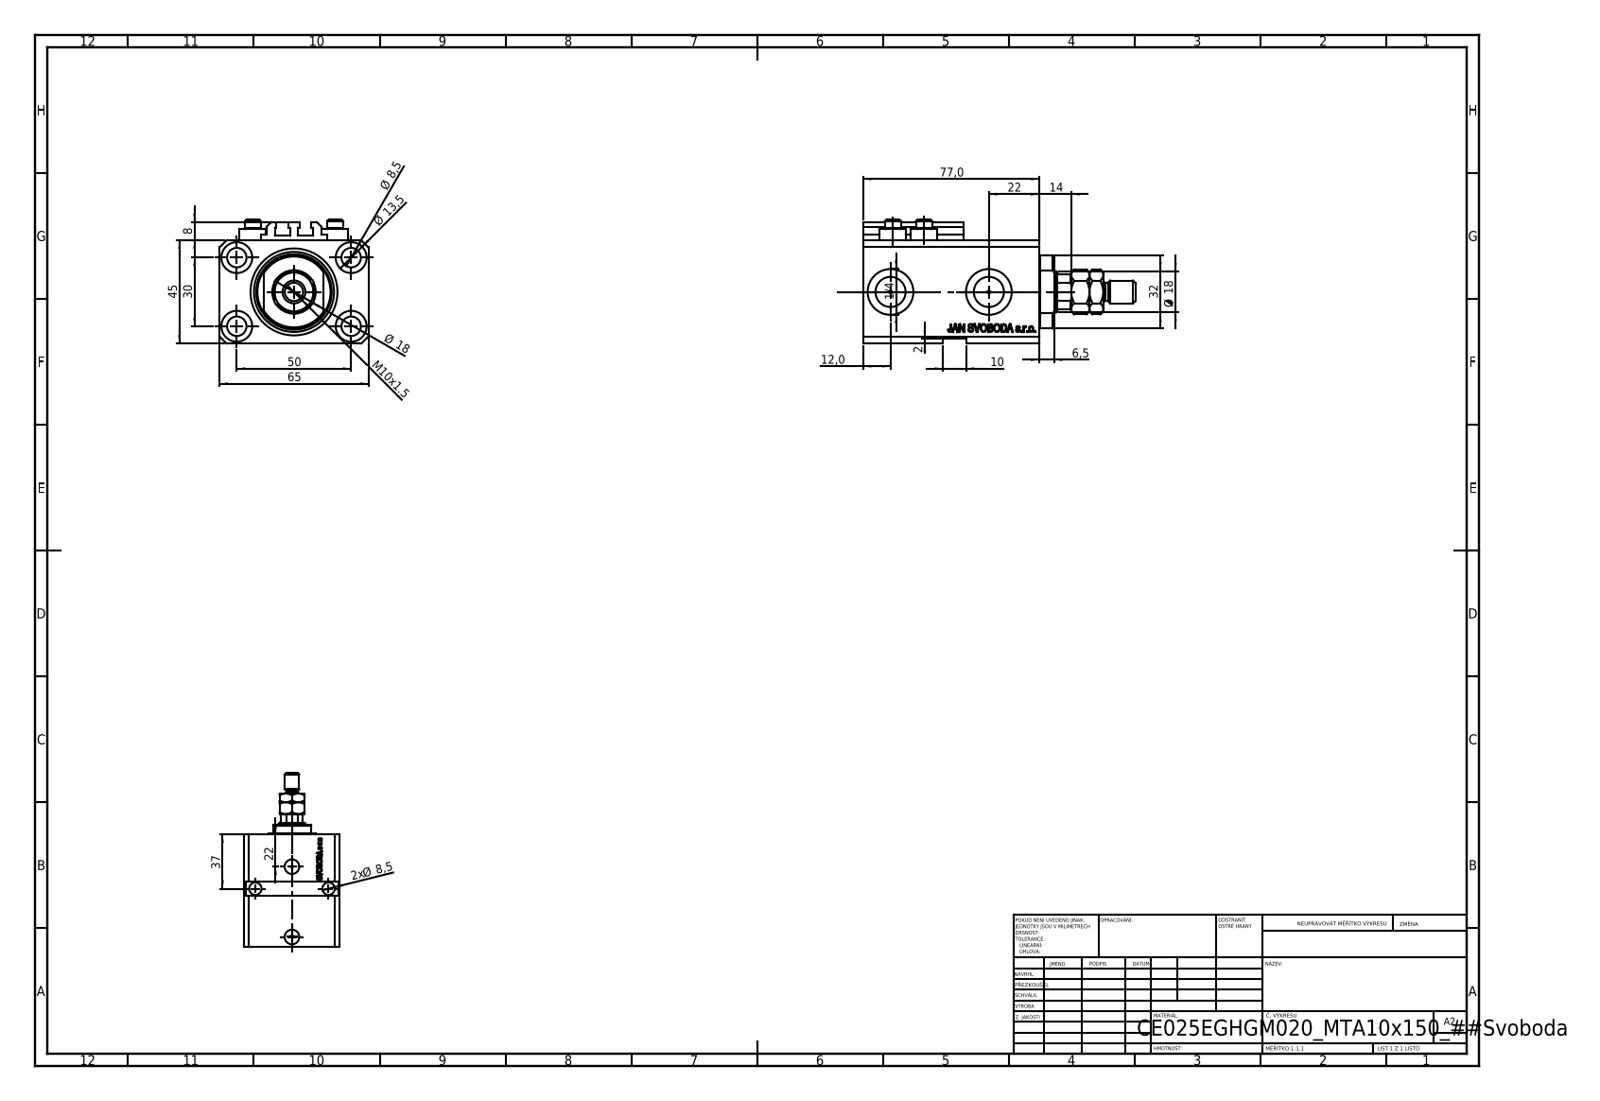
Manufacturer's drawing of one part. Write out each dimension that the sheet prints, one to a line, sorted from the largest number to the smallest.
77,0
65
50
45
37
32
30
22
22
Ø 18
Ø 18
14
Ø 13,5
12,0
M10x1.5
10
Ø 8,5
2x Ø 8,5
8
6,5
2
1/4
